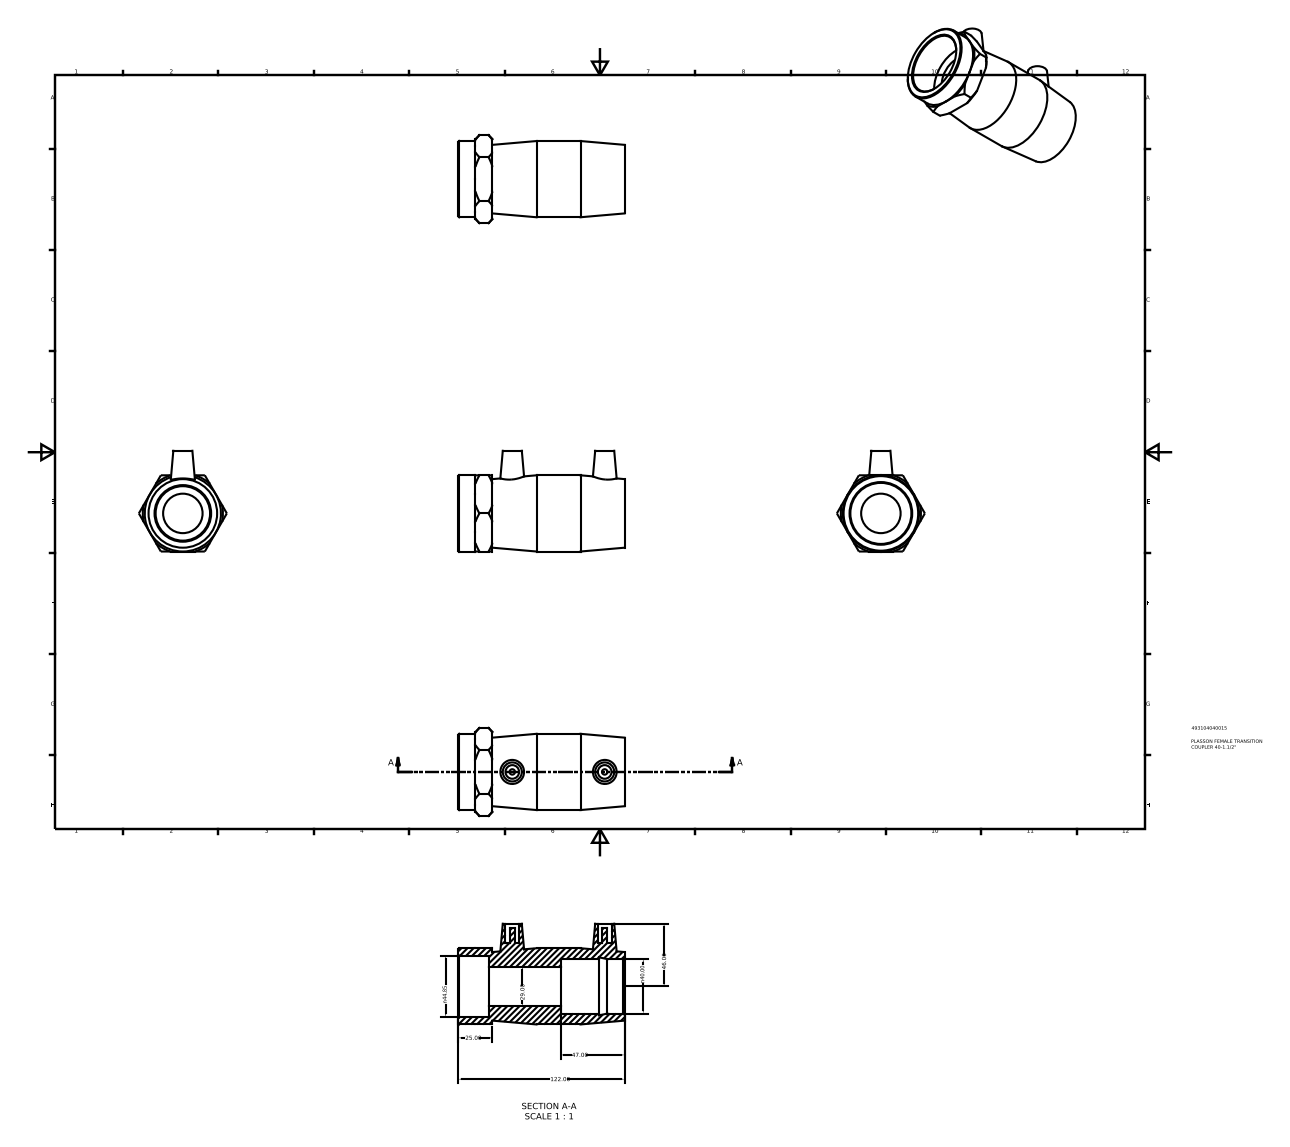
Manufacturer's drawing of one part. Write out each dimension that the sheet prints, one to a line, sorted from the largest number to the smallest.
122.00
47.00
46.00
n44.85
n40.00
29.00
25.00
